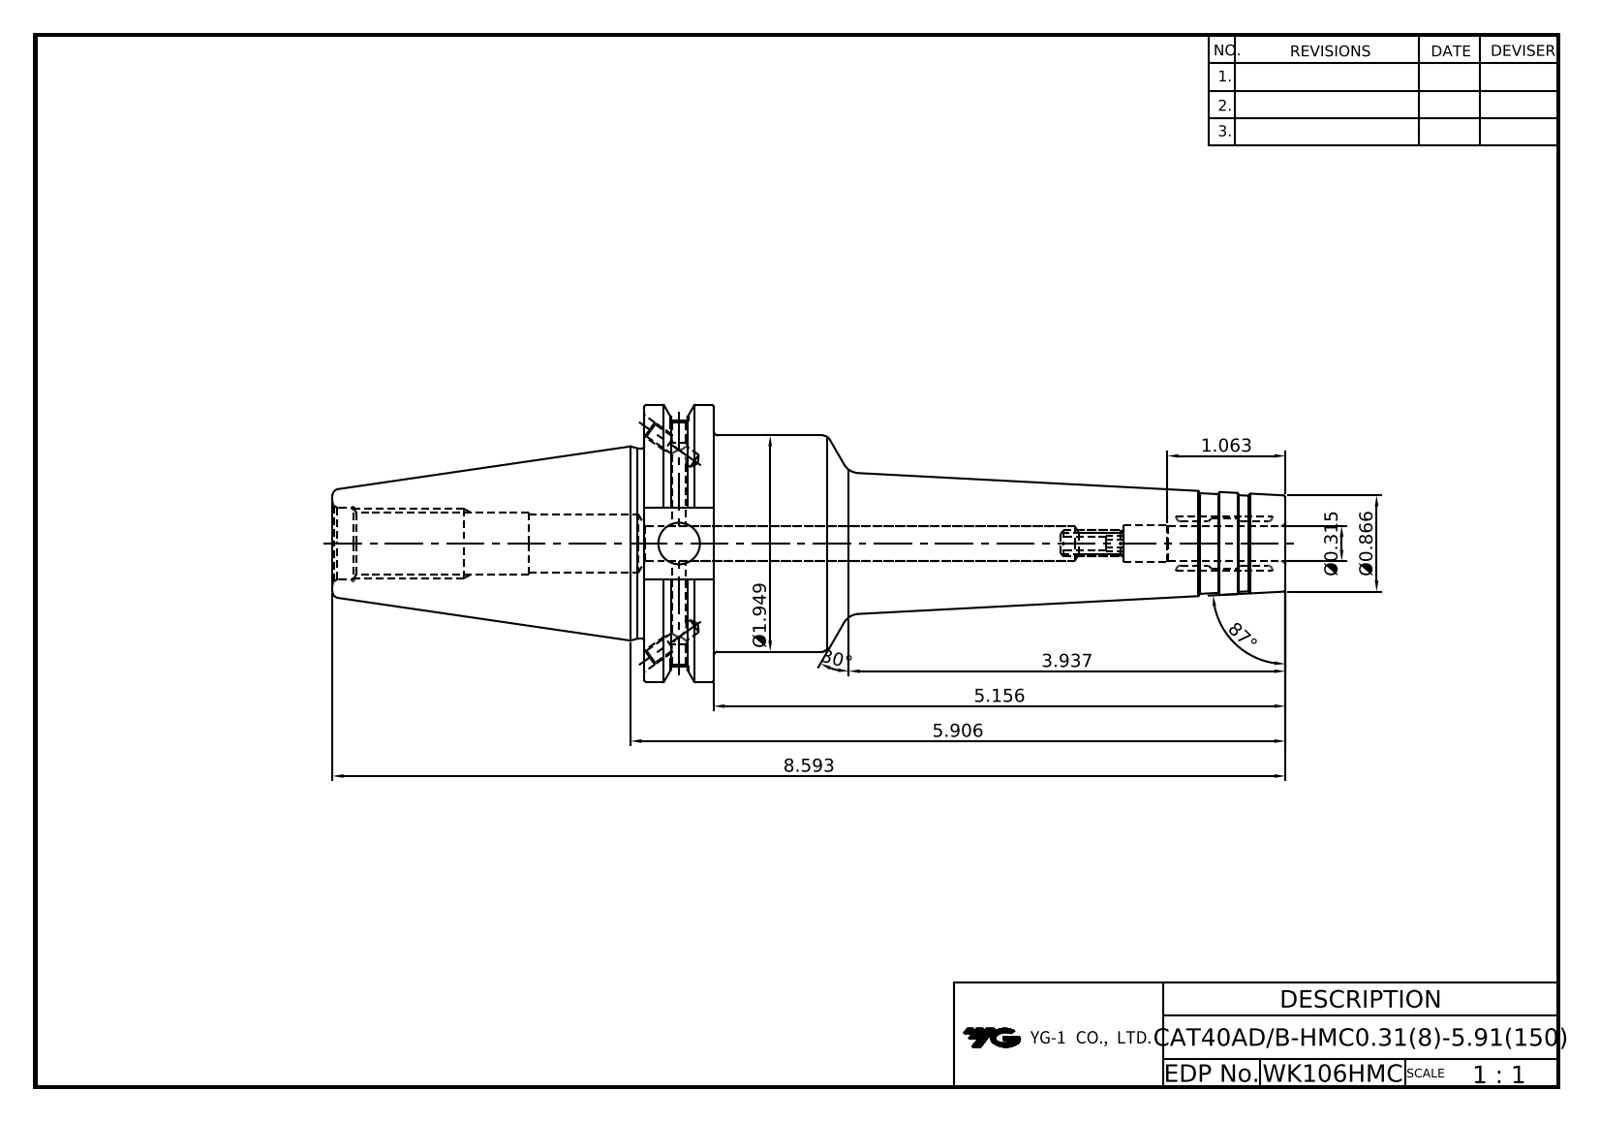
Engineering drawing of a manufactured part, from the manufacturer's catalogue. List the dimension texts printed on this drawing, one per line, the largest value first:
87°
30°
8.593
5.906
5.156
3.937
Ø1.949
1.063
Ø0.866
Ø0.315
